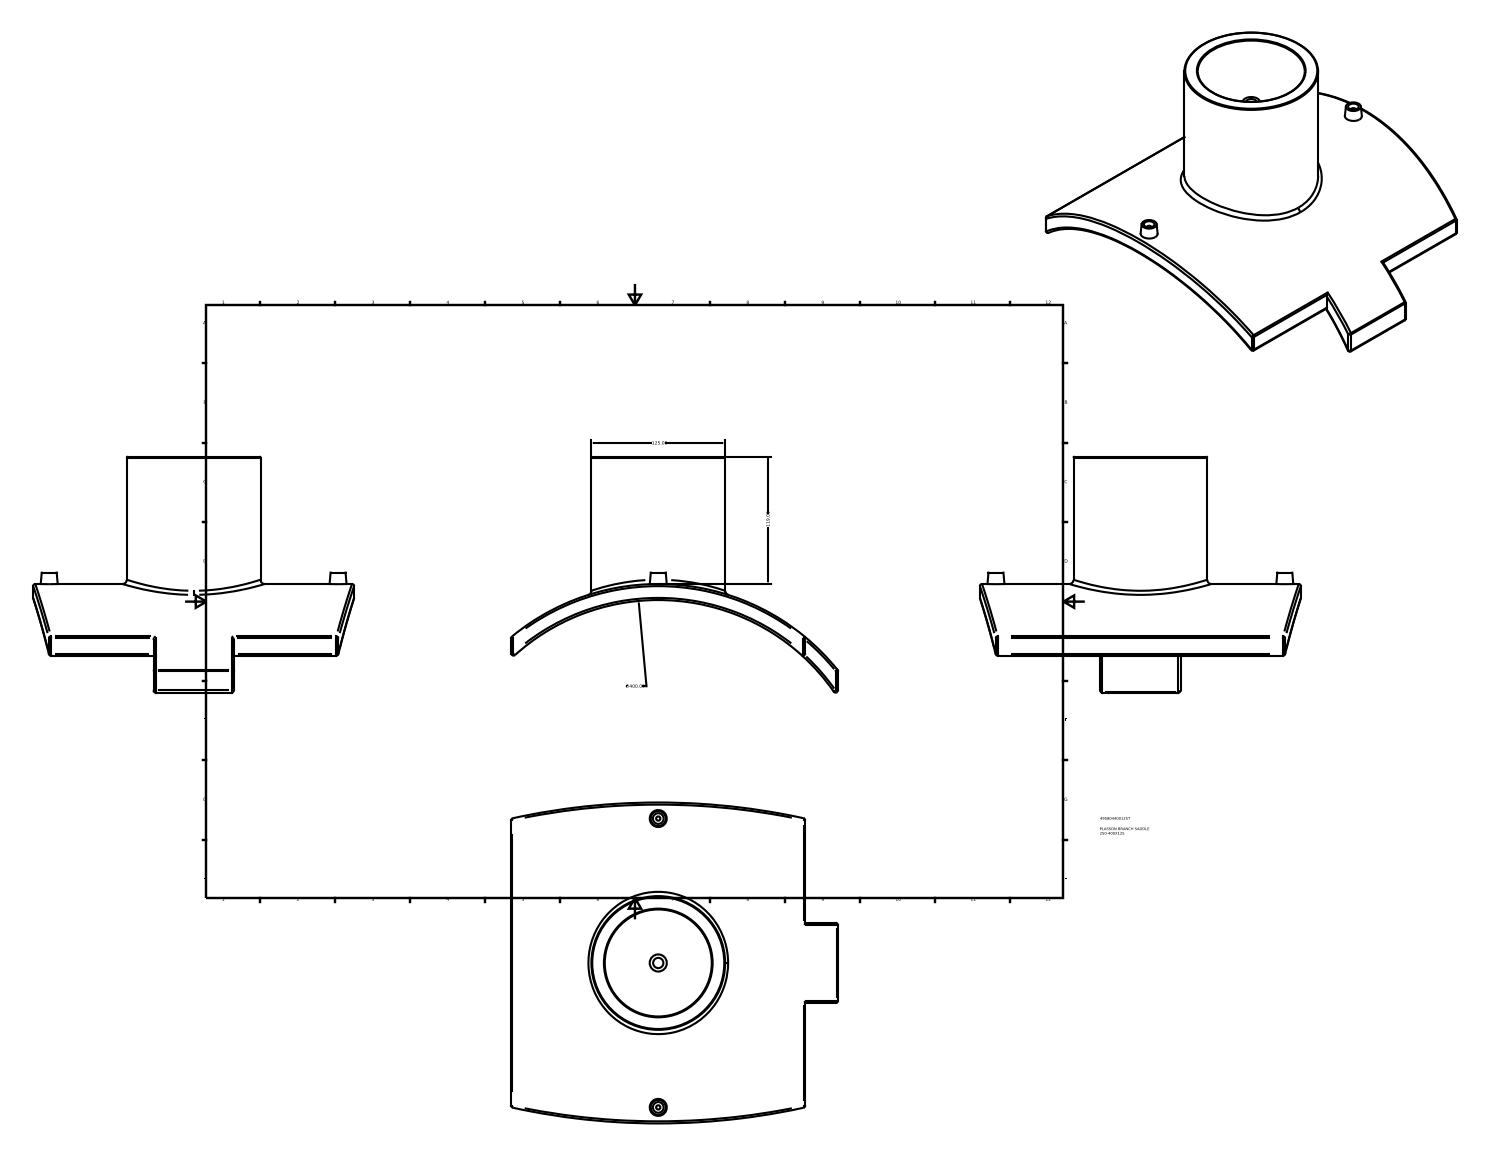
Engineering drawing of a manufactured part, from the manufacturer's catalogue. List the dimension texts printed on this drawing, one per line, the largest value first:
∅400.00
125.00
119.00
